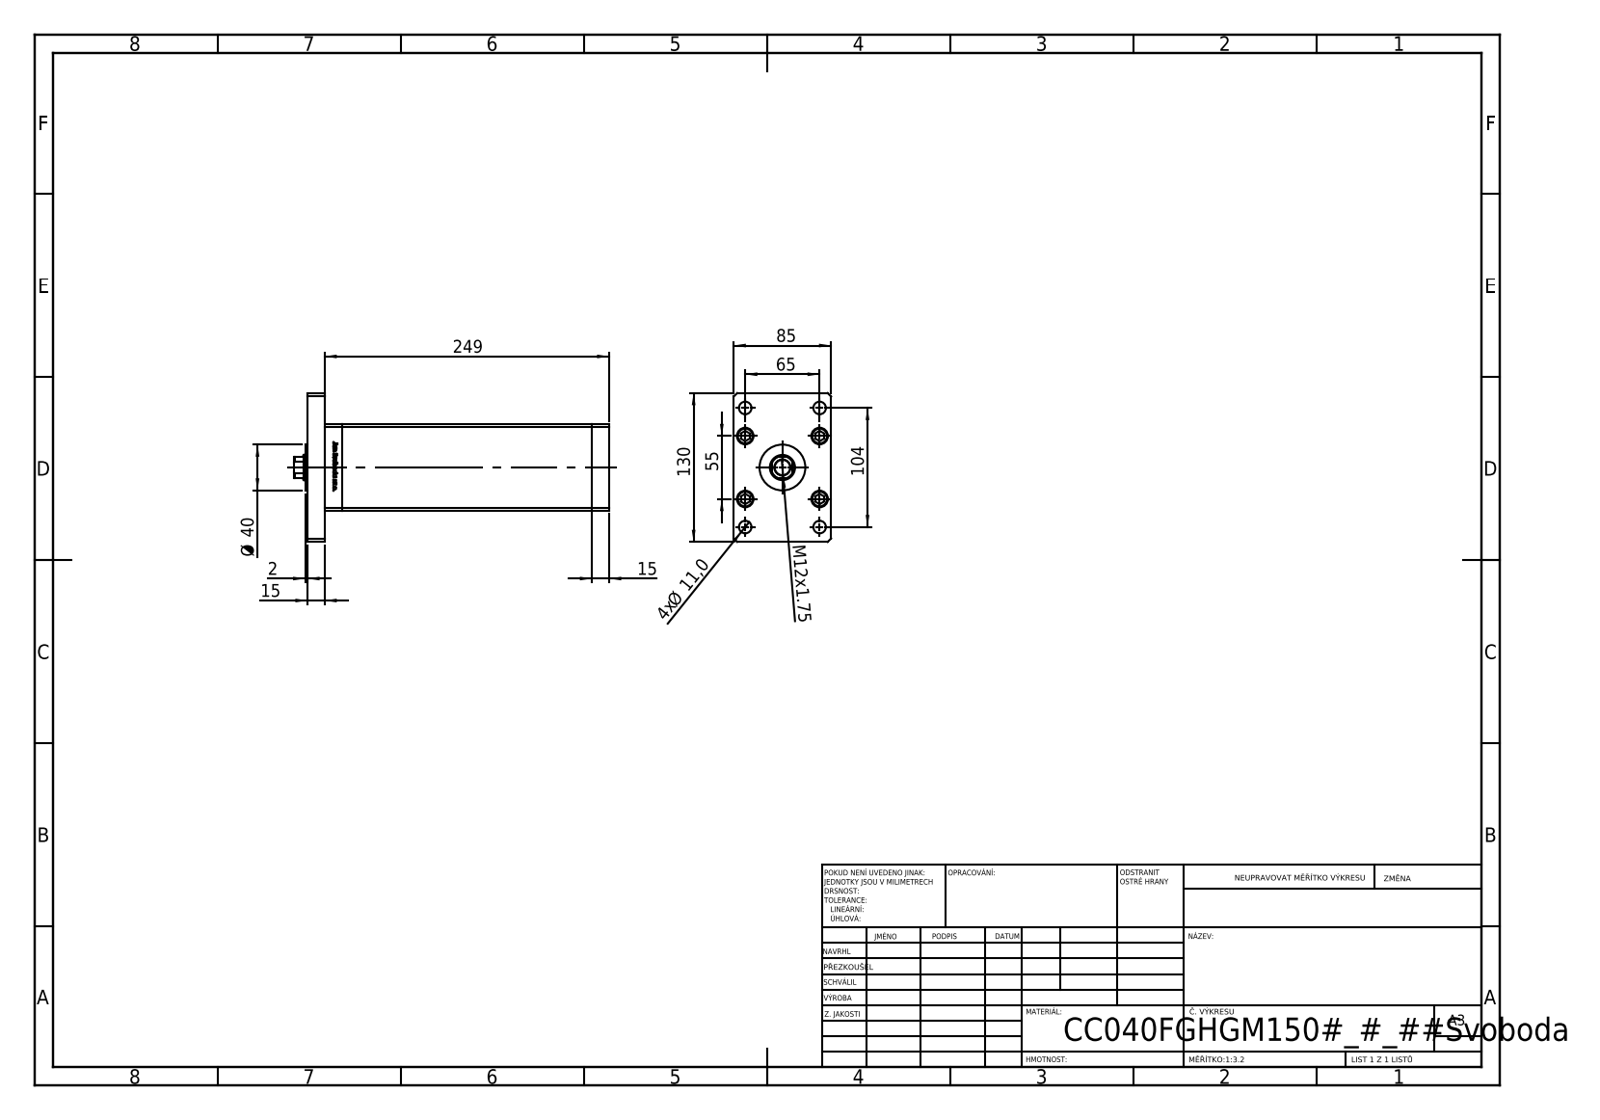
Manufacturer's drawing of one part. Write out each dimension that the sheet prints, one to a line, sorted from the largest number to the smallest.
249
130
104
85
65
55
Ø 40
15
15
M12x1.75
4x Ø 11,0
2
